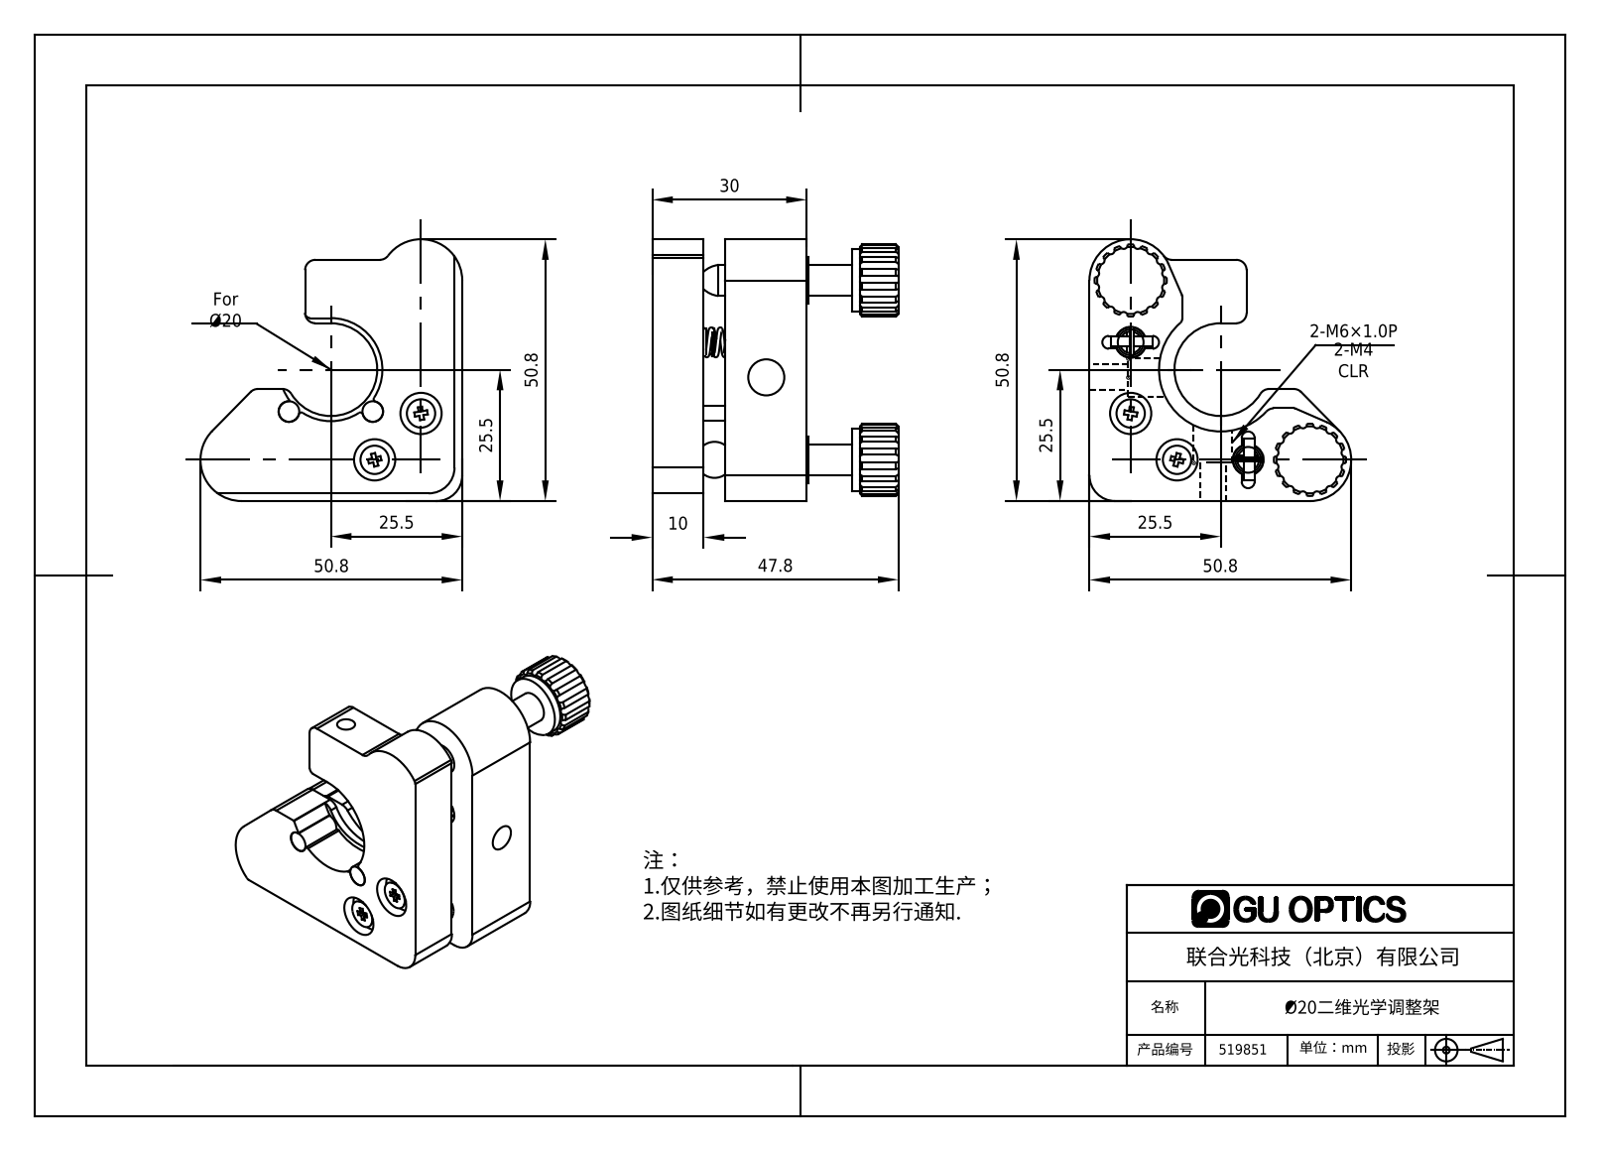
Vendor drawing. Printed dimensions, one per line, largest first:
50.8
50.8
50.8
50.8
47.8
30
25.5
25.5
25.5
25.5
10
